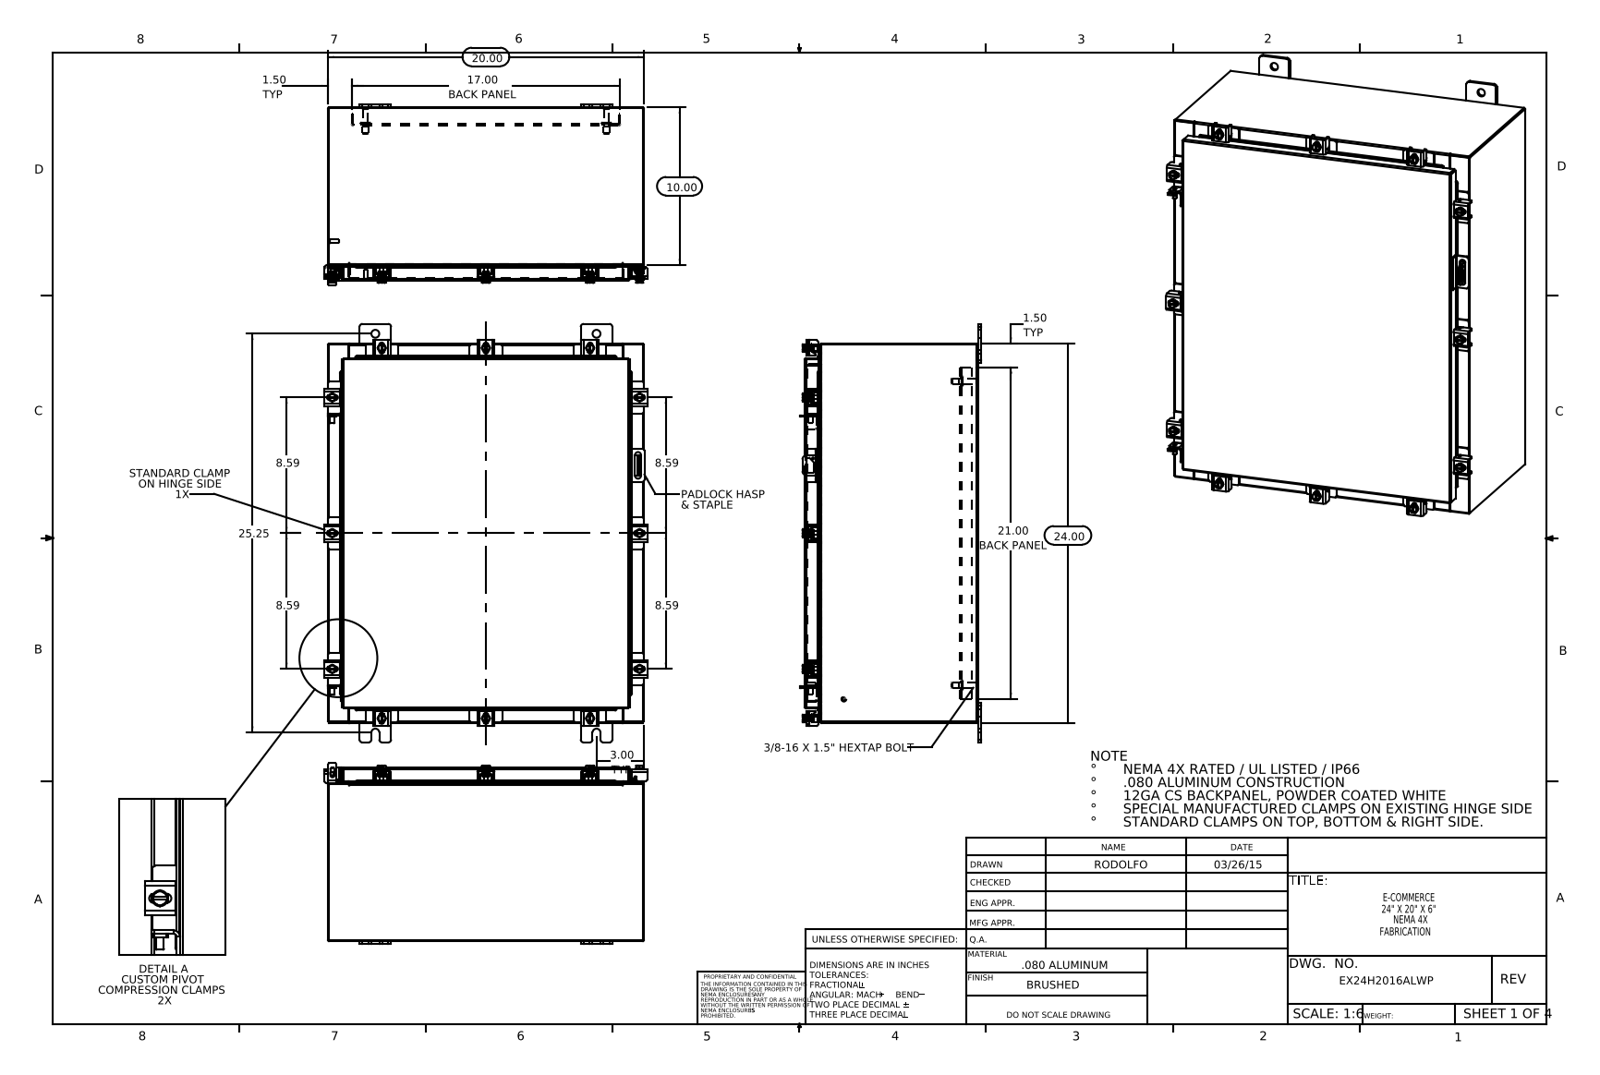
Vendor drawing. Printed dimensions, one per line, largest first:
25.25
24.00
21.00 BACK PANEL
20.00
17.00 BACK PANEL
10.00
8.59
8.59
8.59
8.59
3.00 TYP
1.50 TYP
1.50 TYP
